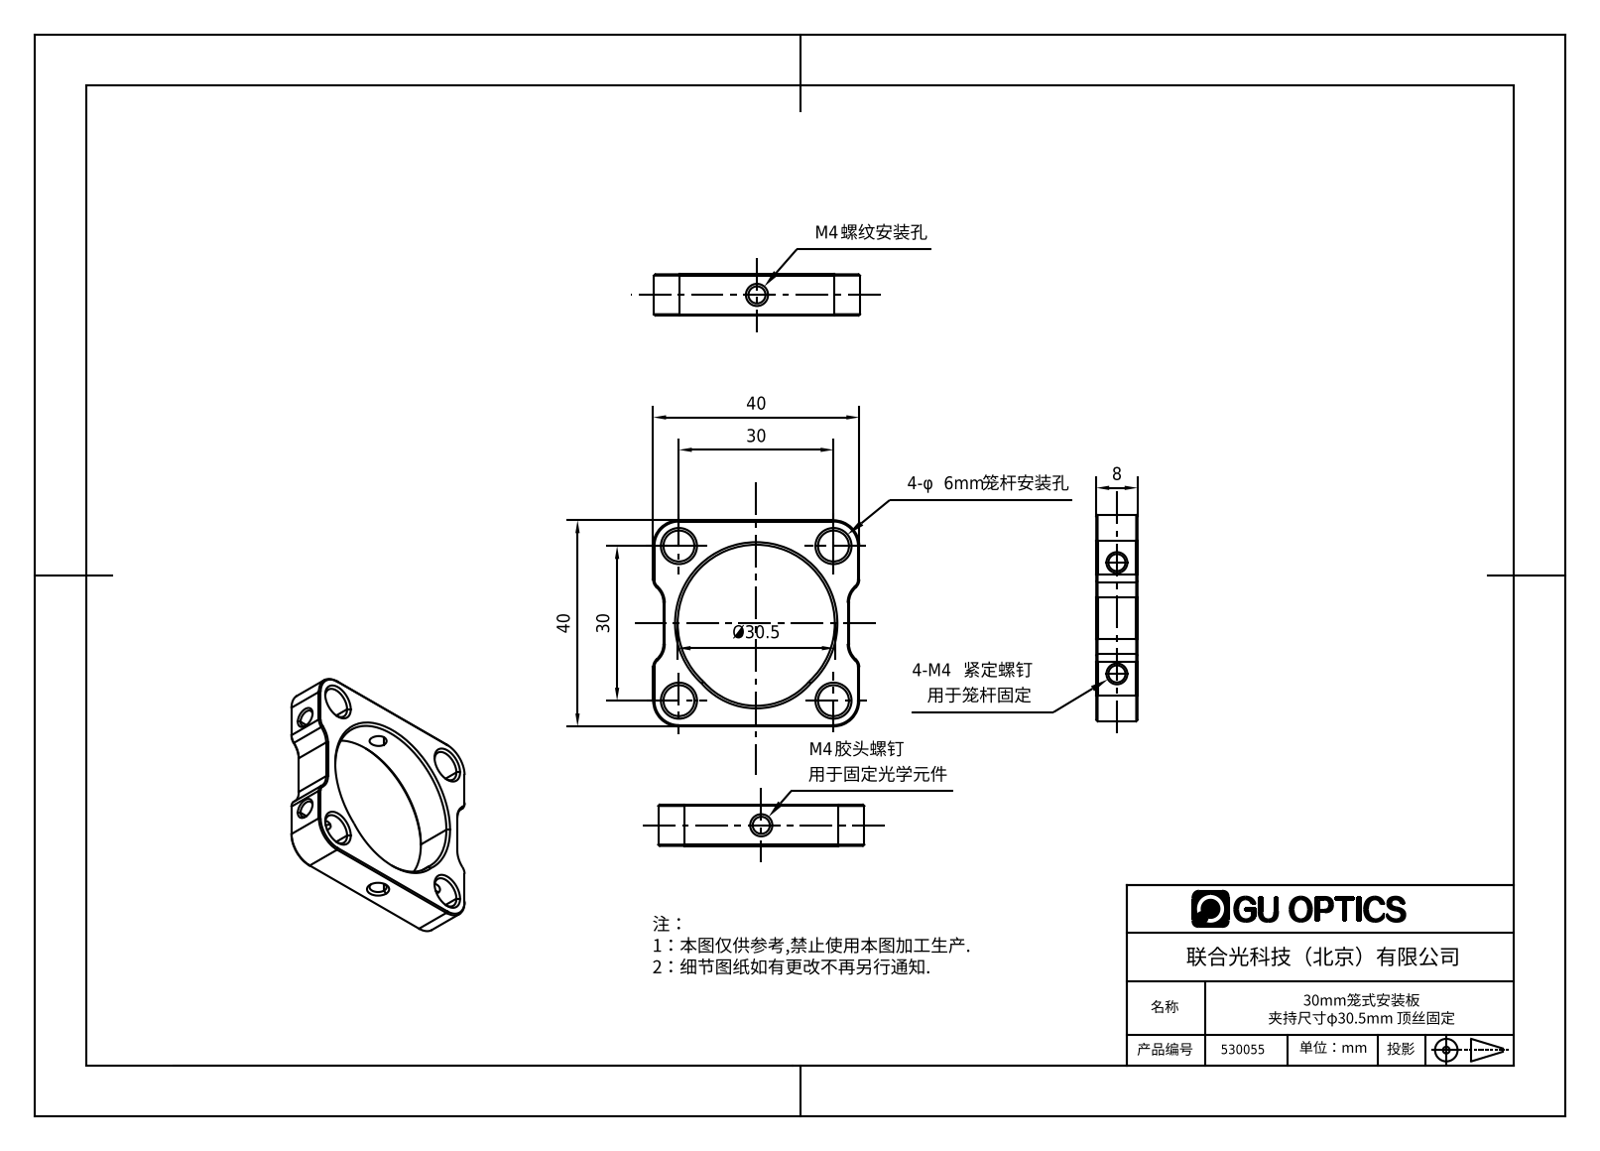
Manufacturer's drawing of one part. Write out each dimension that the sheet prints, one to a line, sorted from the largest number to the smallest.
40
40
Ø30.5
30
30
8
